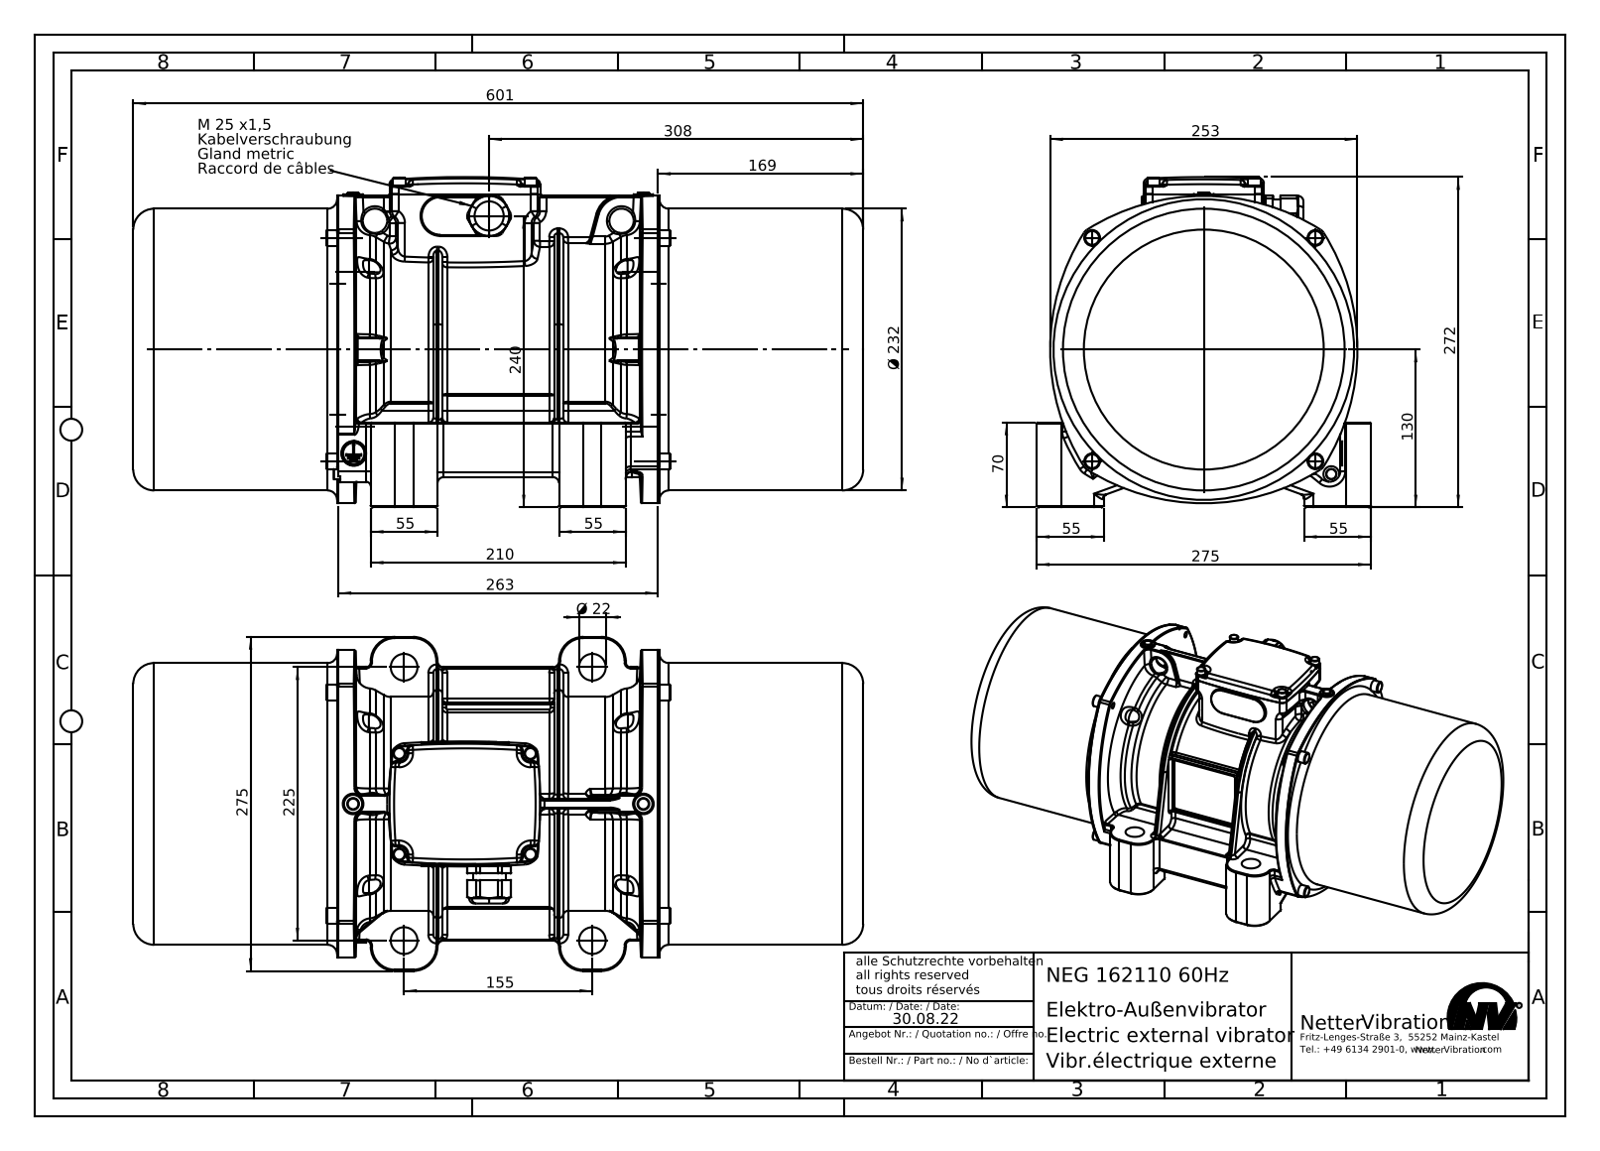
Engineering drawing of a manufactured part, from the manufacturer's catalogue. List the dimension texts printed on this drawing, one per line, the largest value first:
601
308
275
275
272
263
253
240
Ø 232
225
210
169
155
130
70
55
55
55
55
Ø 22
